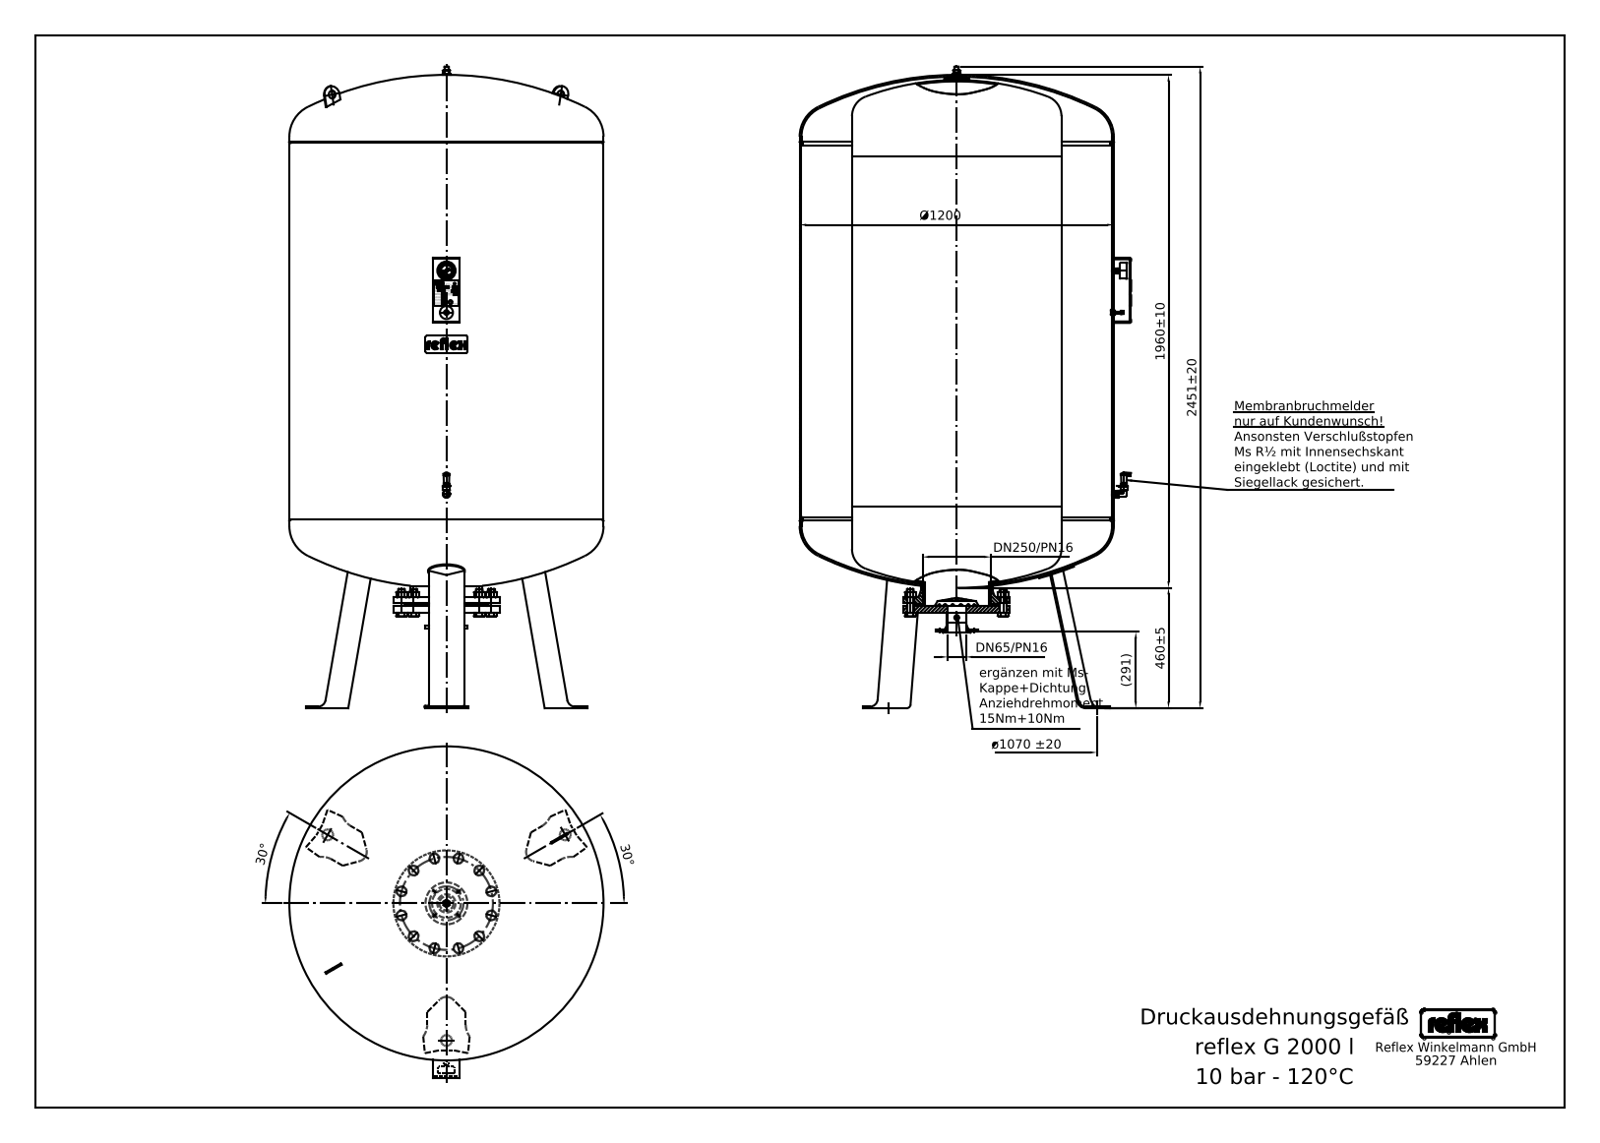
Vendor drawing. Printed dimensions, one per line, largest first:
2451±20
1960±10
Ø1200
460±5
(291)
DN250/PN16
DN65/PN16
30°
30°
±20
